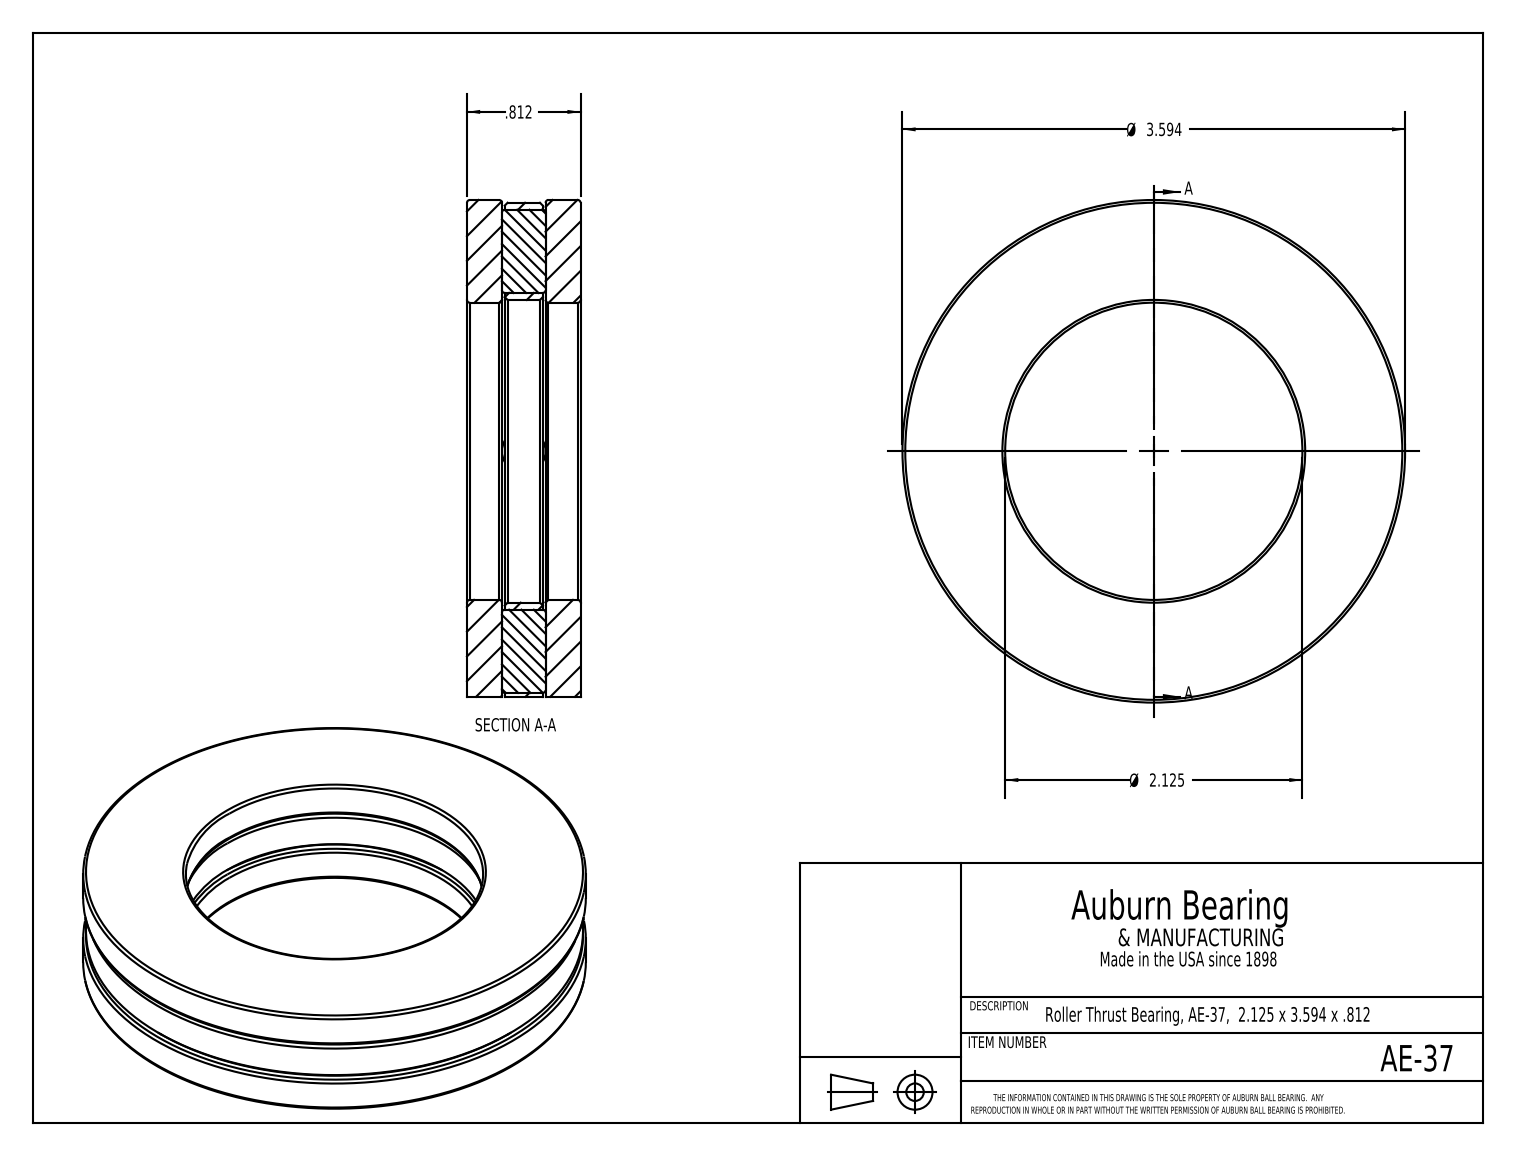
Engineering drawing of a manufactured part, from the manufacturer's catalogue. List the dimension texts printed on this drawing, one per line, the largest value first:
Ø 3.594
Ø 2.125
.812
